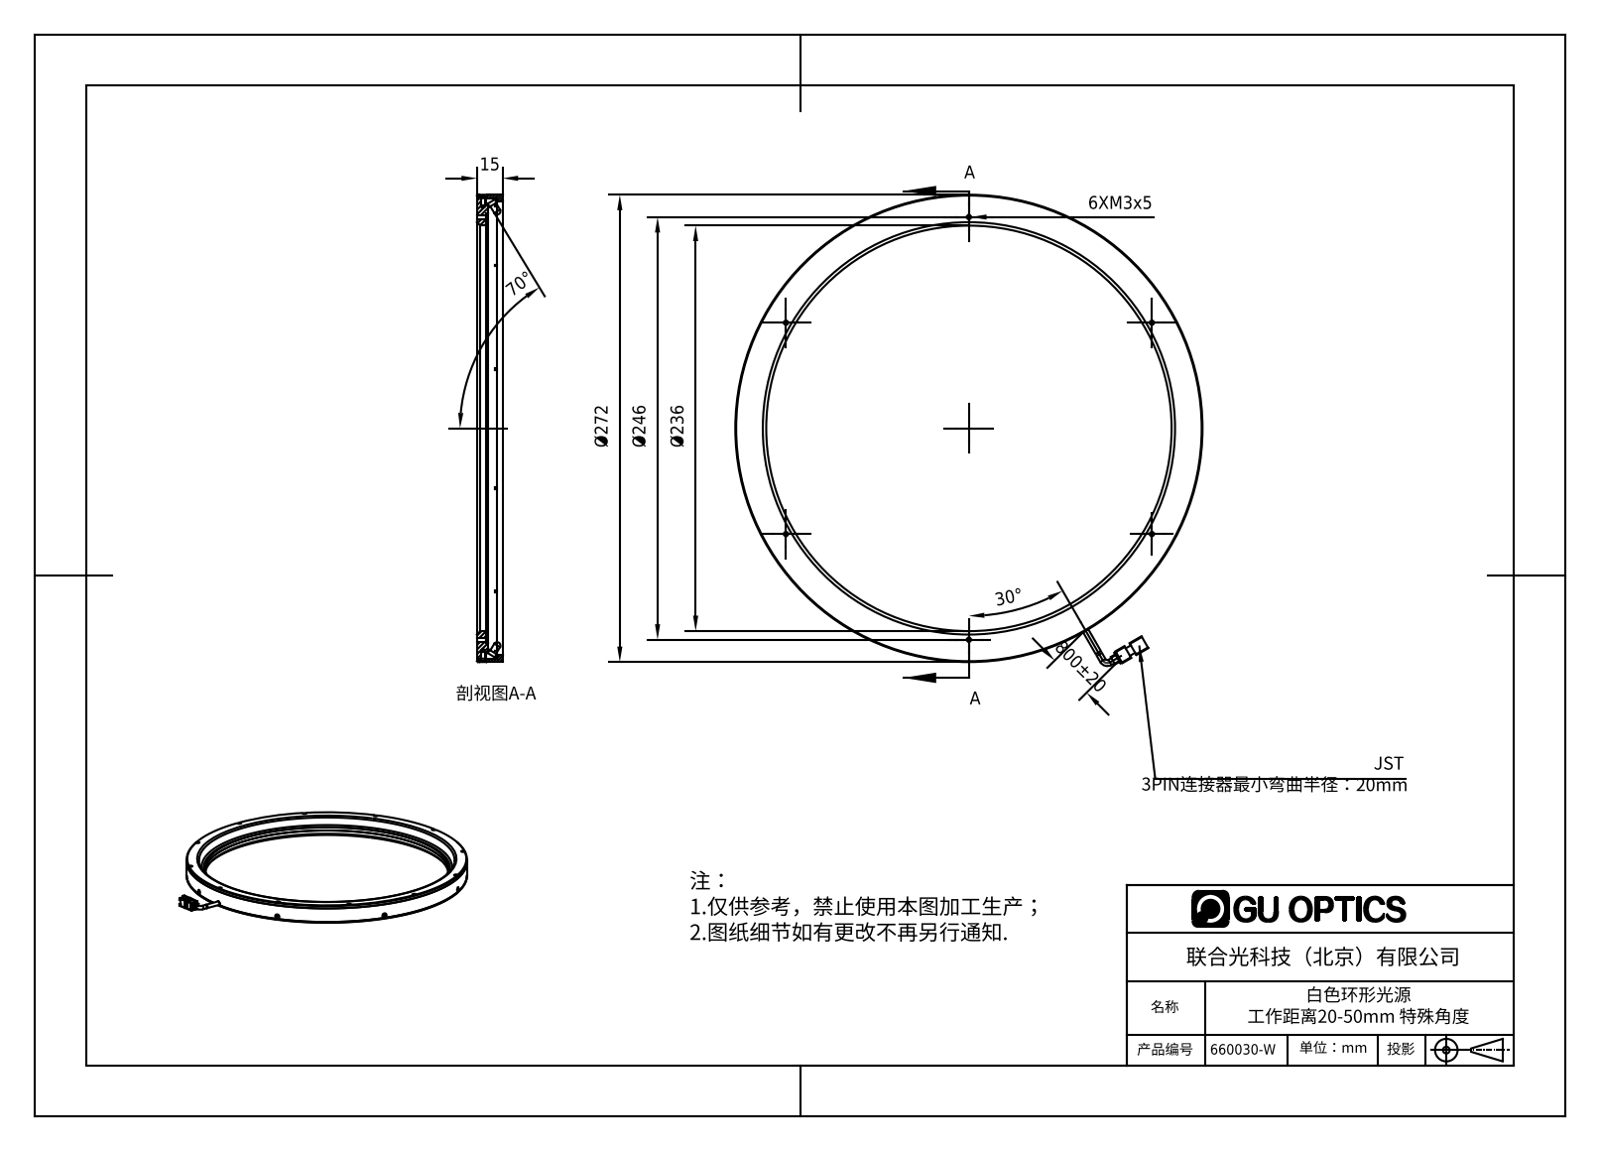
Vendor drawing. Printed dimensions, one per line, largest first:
800±20
Ø272
Ø246
Ø236
70°
30°
15
6XM3x5
